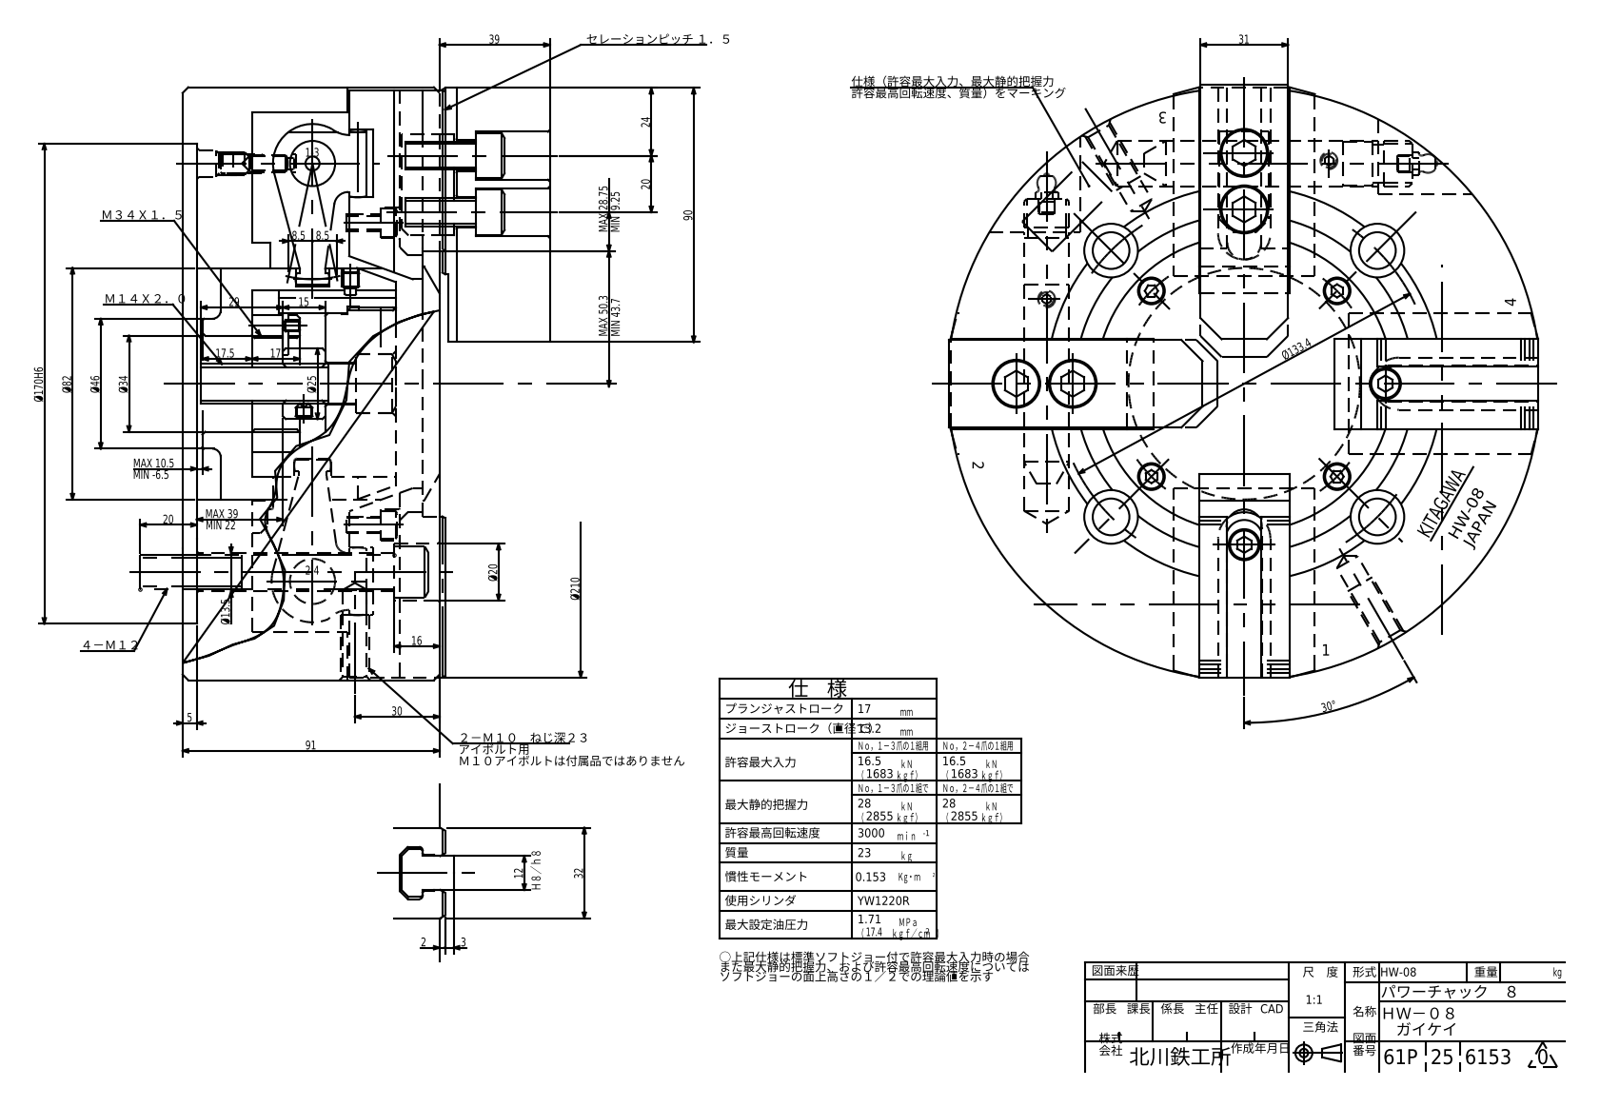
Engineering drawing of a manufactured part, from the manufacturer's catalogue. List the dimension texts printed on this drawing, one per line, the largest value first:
Ø170H6
Ø133.4
91
90
Ø82
MAX 50.3
Ø46
39
MAX 39
Ø34
32
31
30°
30
29
MAX 28.75
Ø25
24
20
20
Ø20
17.5
17
16
15
Ø13.5
12
MAX 10.5
8.5
8.5
5
3
2
